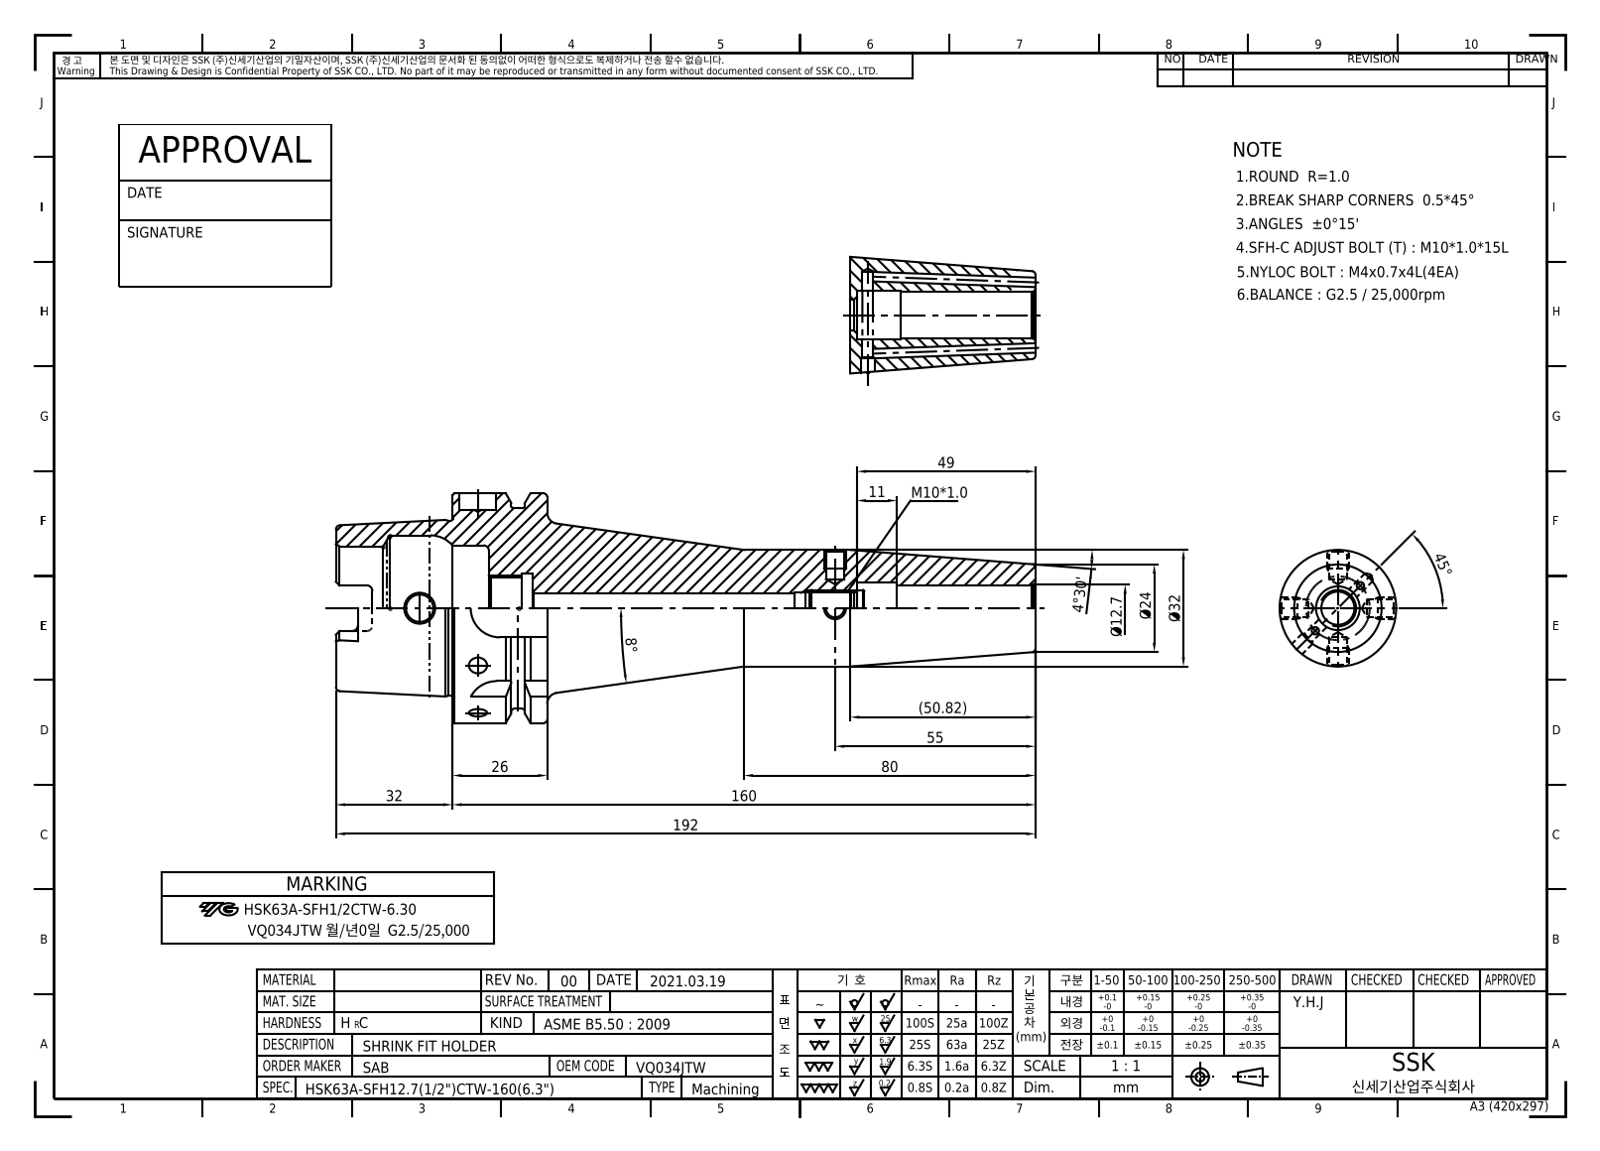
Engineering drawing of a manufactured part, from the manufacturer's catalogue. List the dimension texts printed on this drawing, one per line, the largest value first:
192
160
80
55
(50.82)
49
45°
32
Ø32
26
Ø24
Ø12.7
11
8°
4°30'
